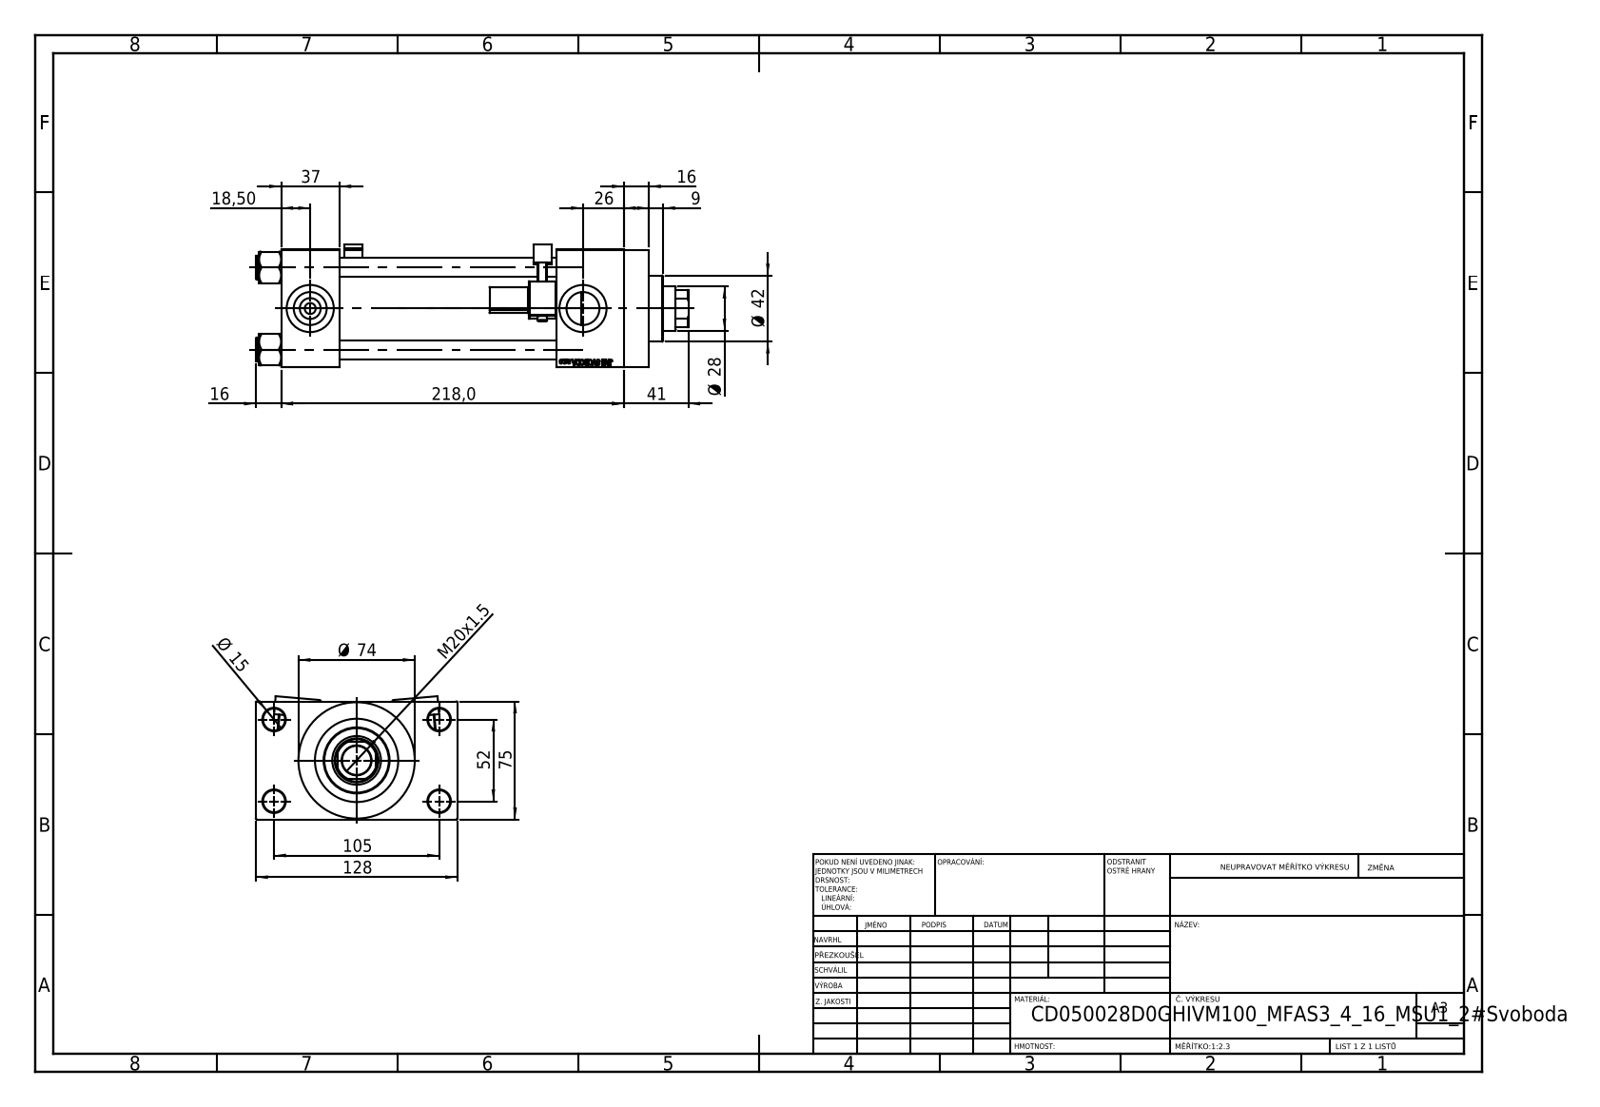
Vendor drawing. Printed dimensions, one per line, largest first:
218,0
128
105
75
Ø 74
52
Ø 42
41
37
Ø 28
26
M20x1.5
18,50
16
16
Ø 15
9
